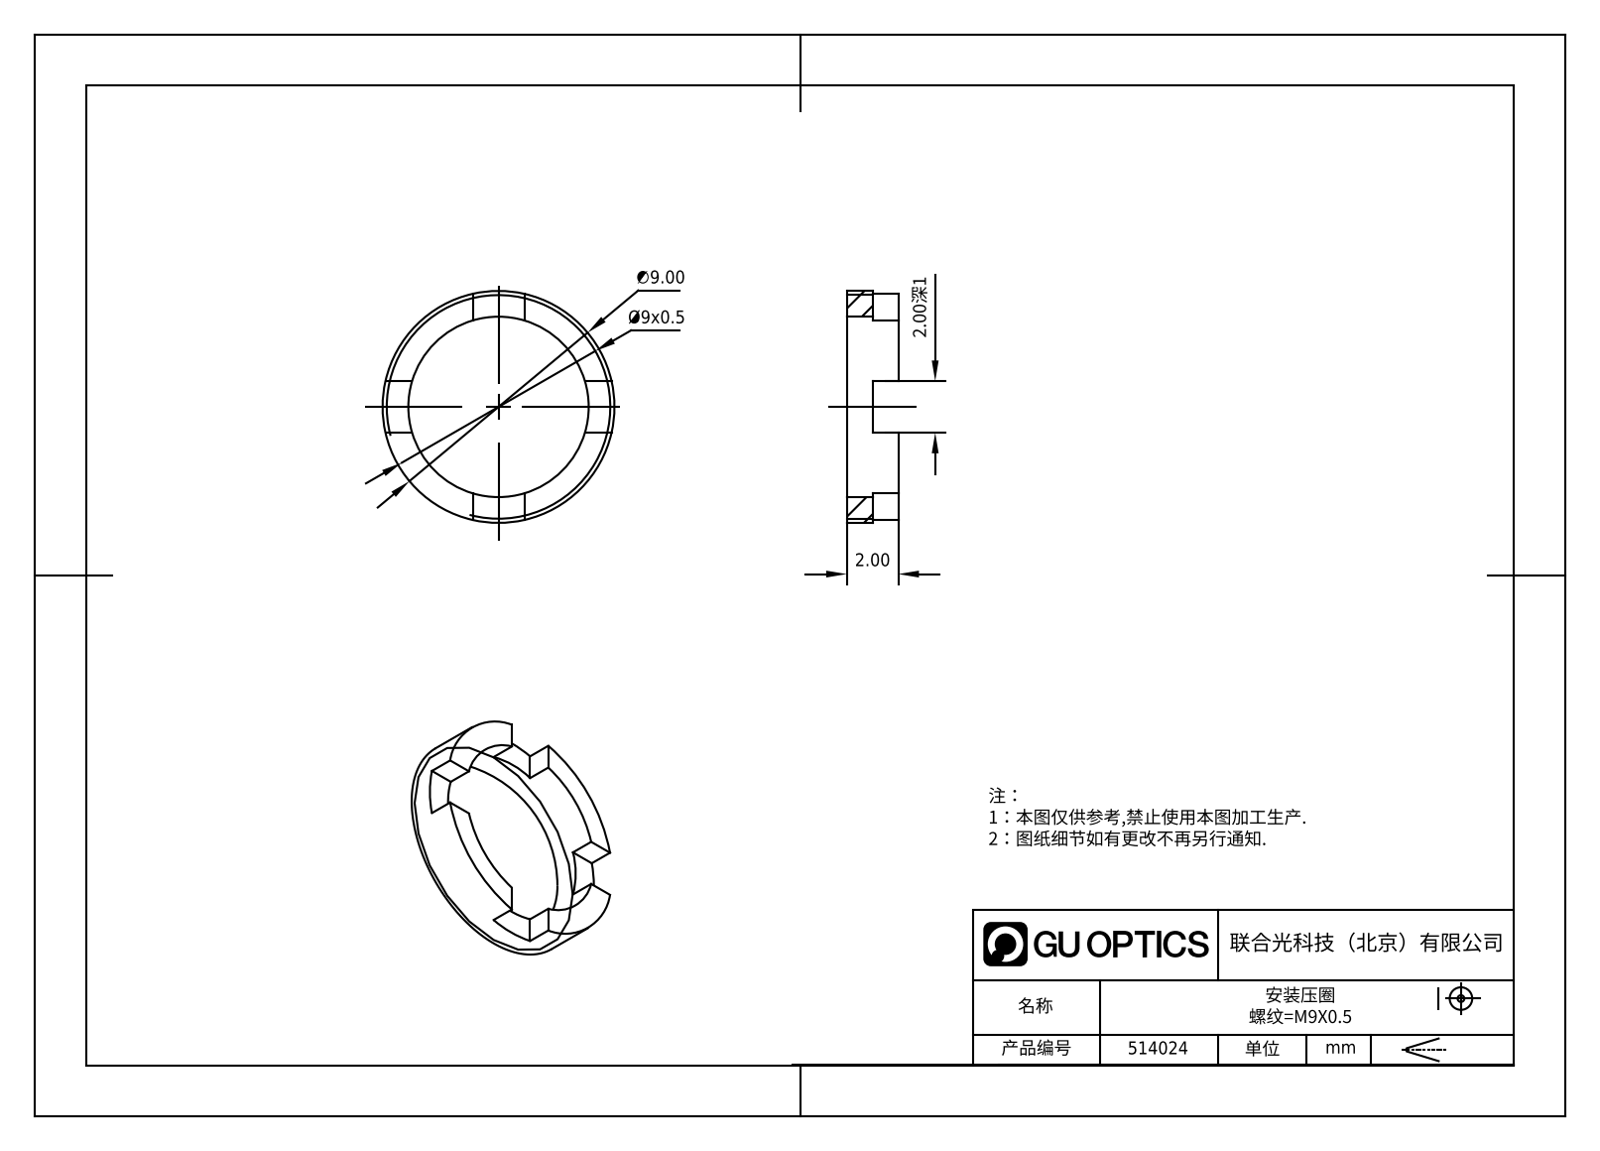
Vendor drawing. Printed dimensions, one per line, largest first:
∅9.00
Ø9x0.5
2.00
2.00深1
